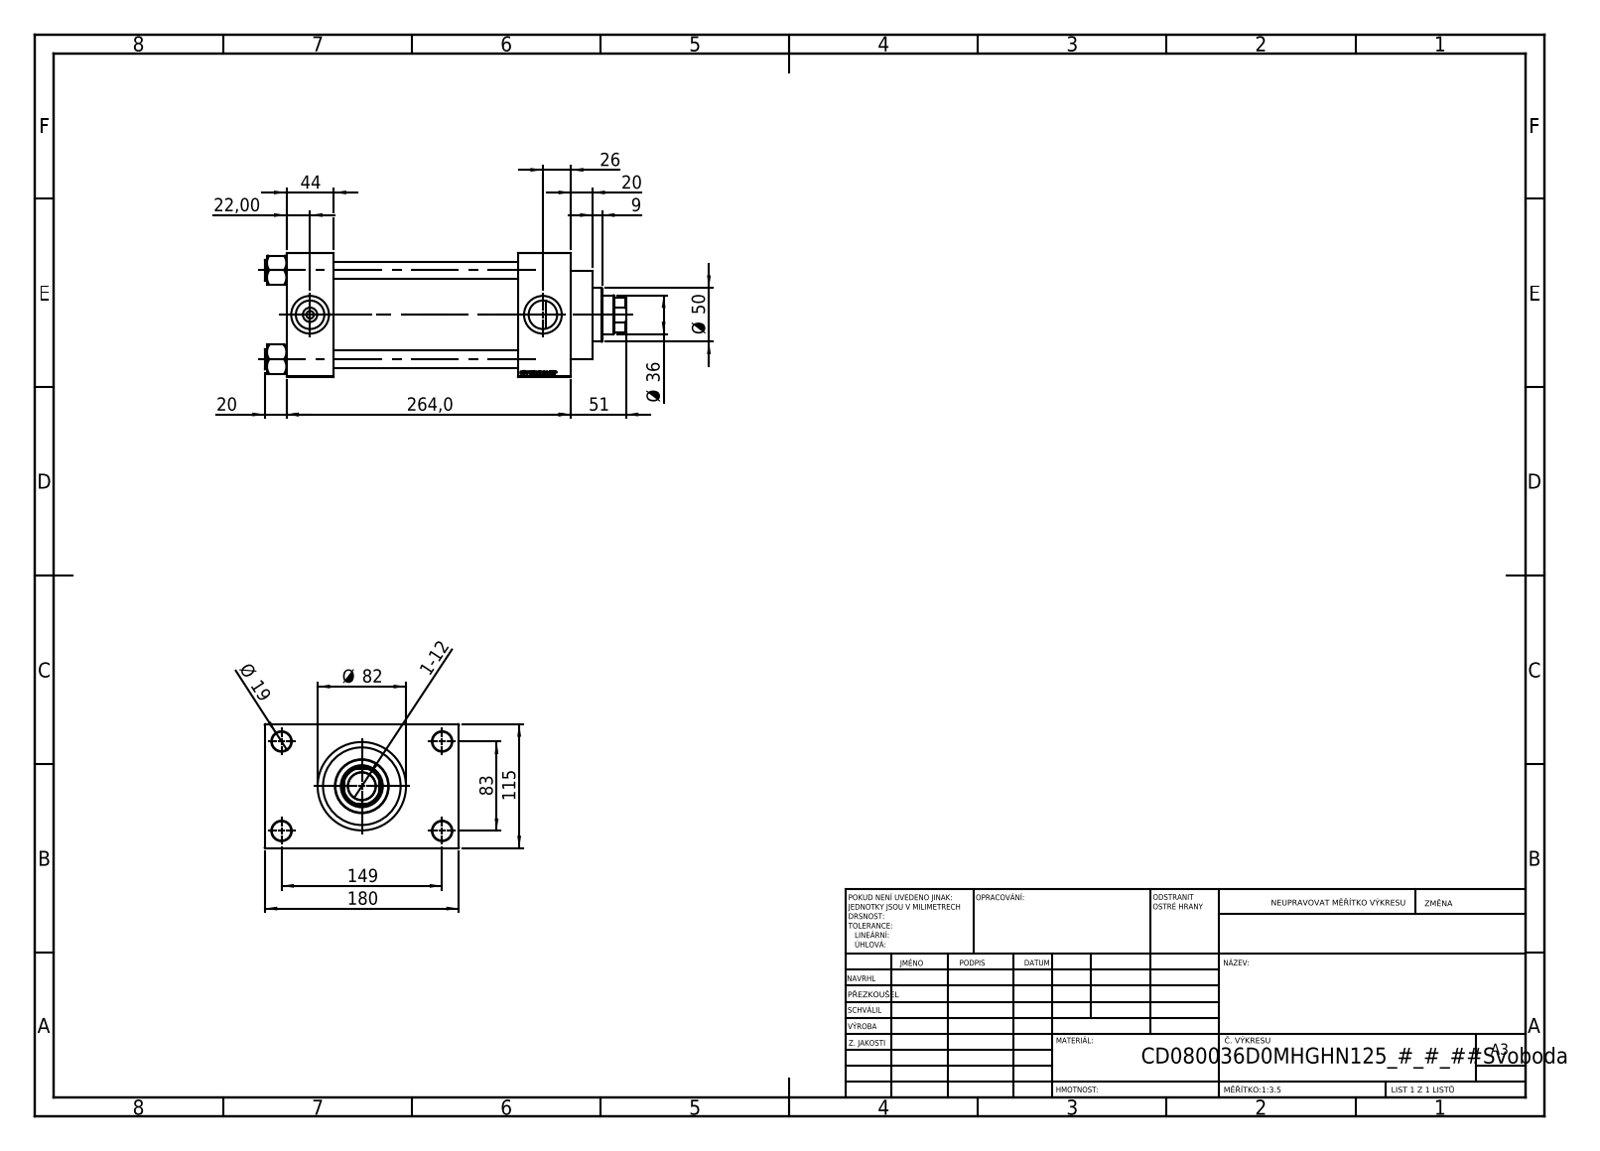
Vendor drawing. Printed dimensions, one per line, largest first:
264,0
180
149
115
83
Ø 82
51
Ø 50
44
Ø 36
26
22,00
20
20
Ø 19
9
1-12
